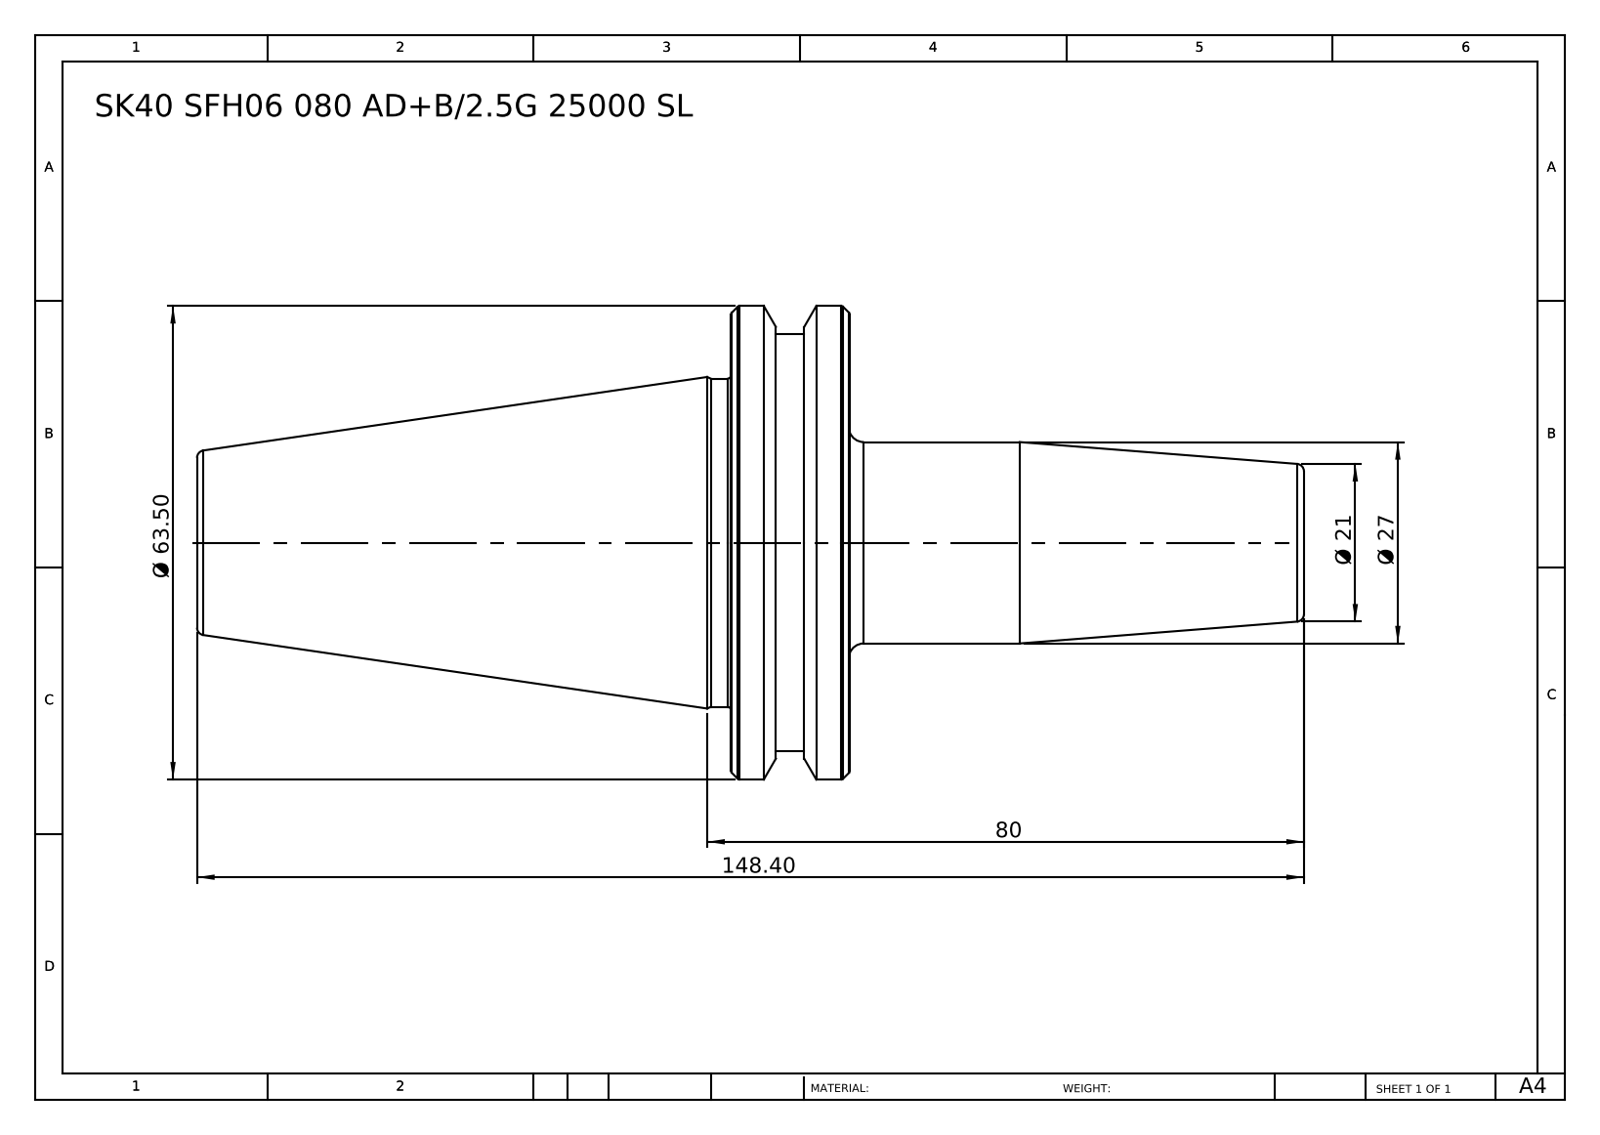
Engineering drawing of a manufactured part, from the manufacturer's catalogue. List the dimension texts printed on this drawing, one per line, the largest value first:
148.40
80
Ø 63.50
Ø 27
Ø 21
